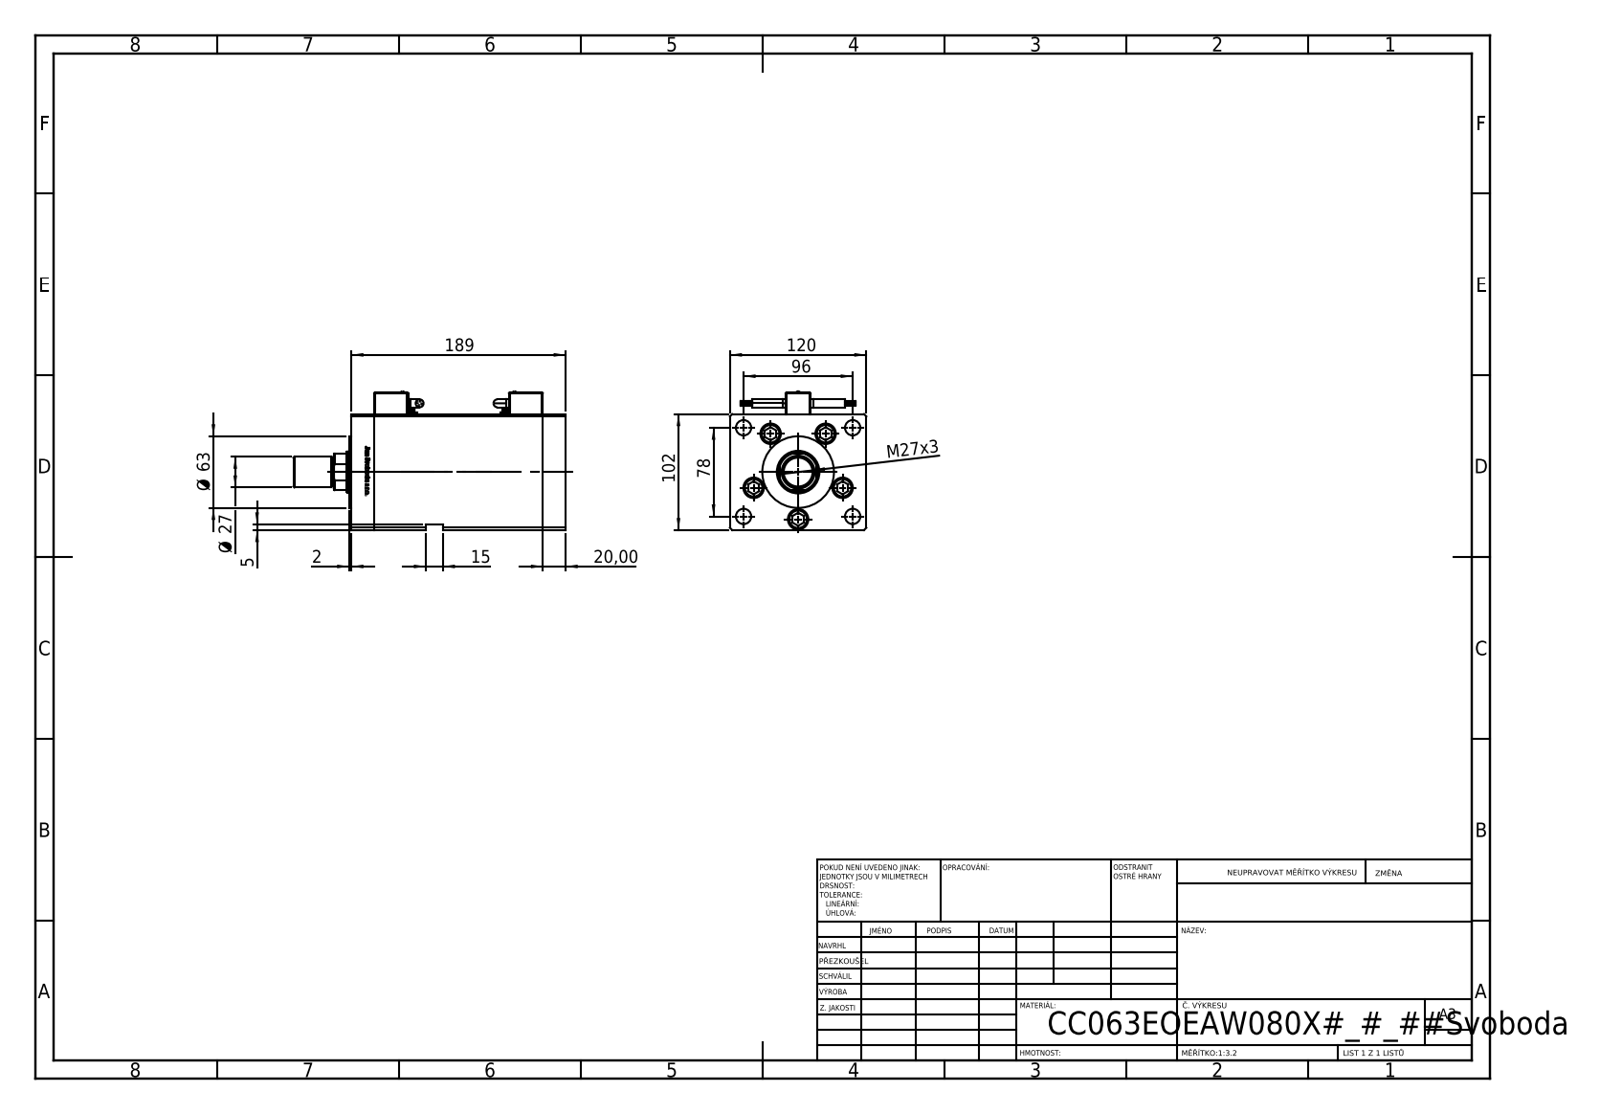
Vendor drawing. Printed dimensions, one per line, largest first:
189
120
102
96
78
Ø 63
Ø 27
M27x3
20,00
15
5
2
